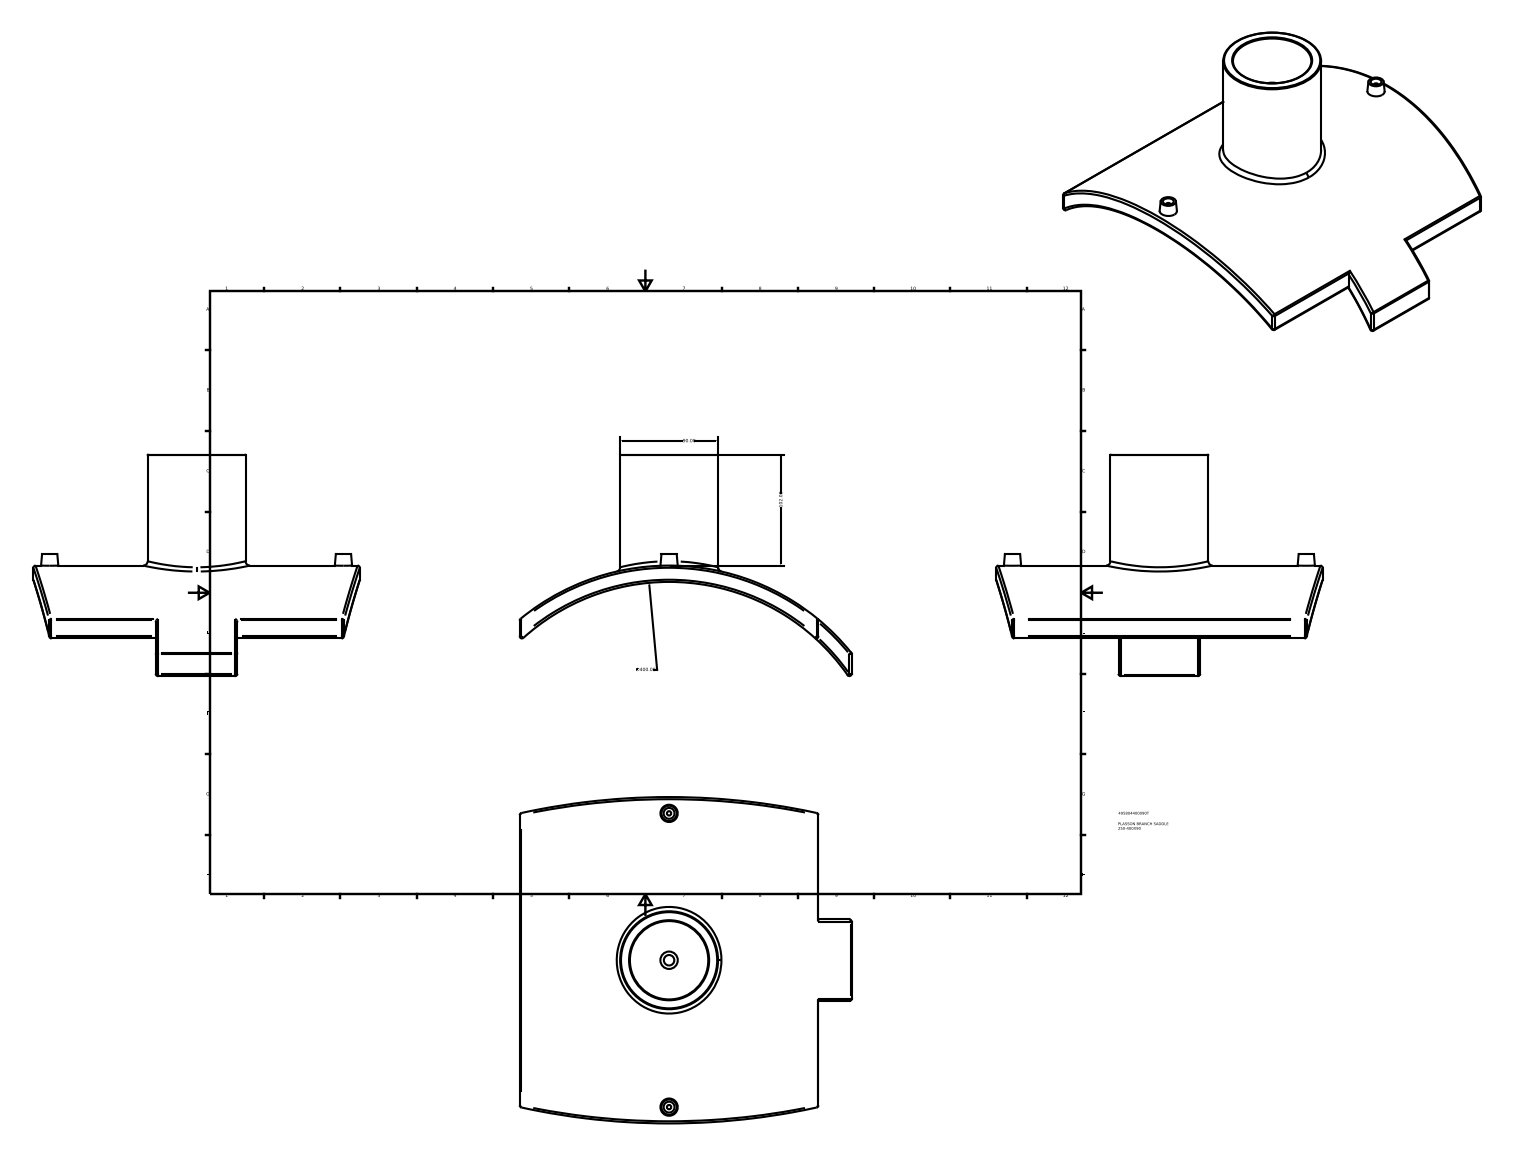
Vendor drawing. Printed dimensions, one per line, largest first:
∅400.00
102.00
90.00
